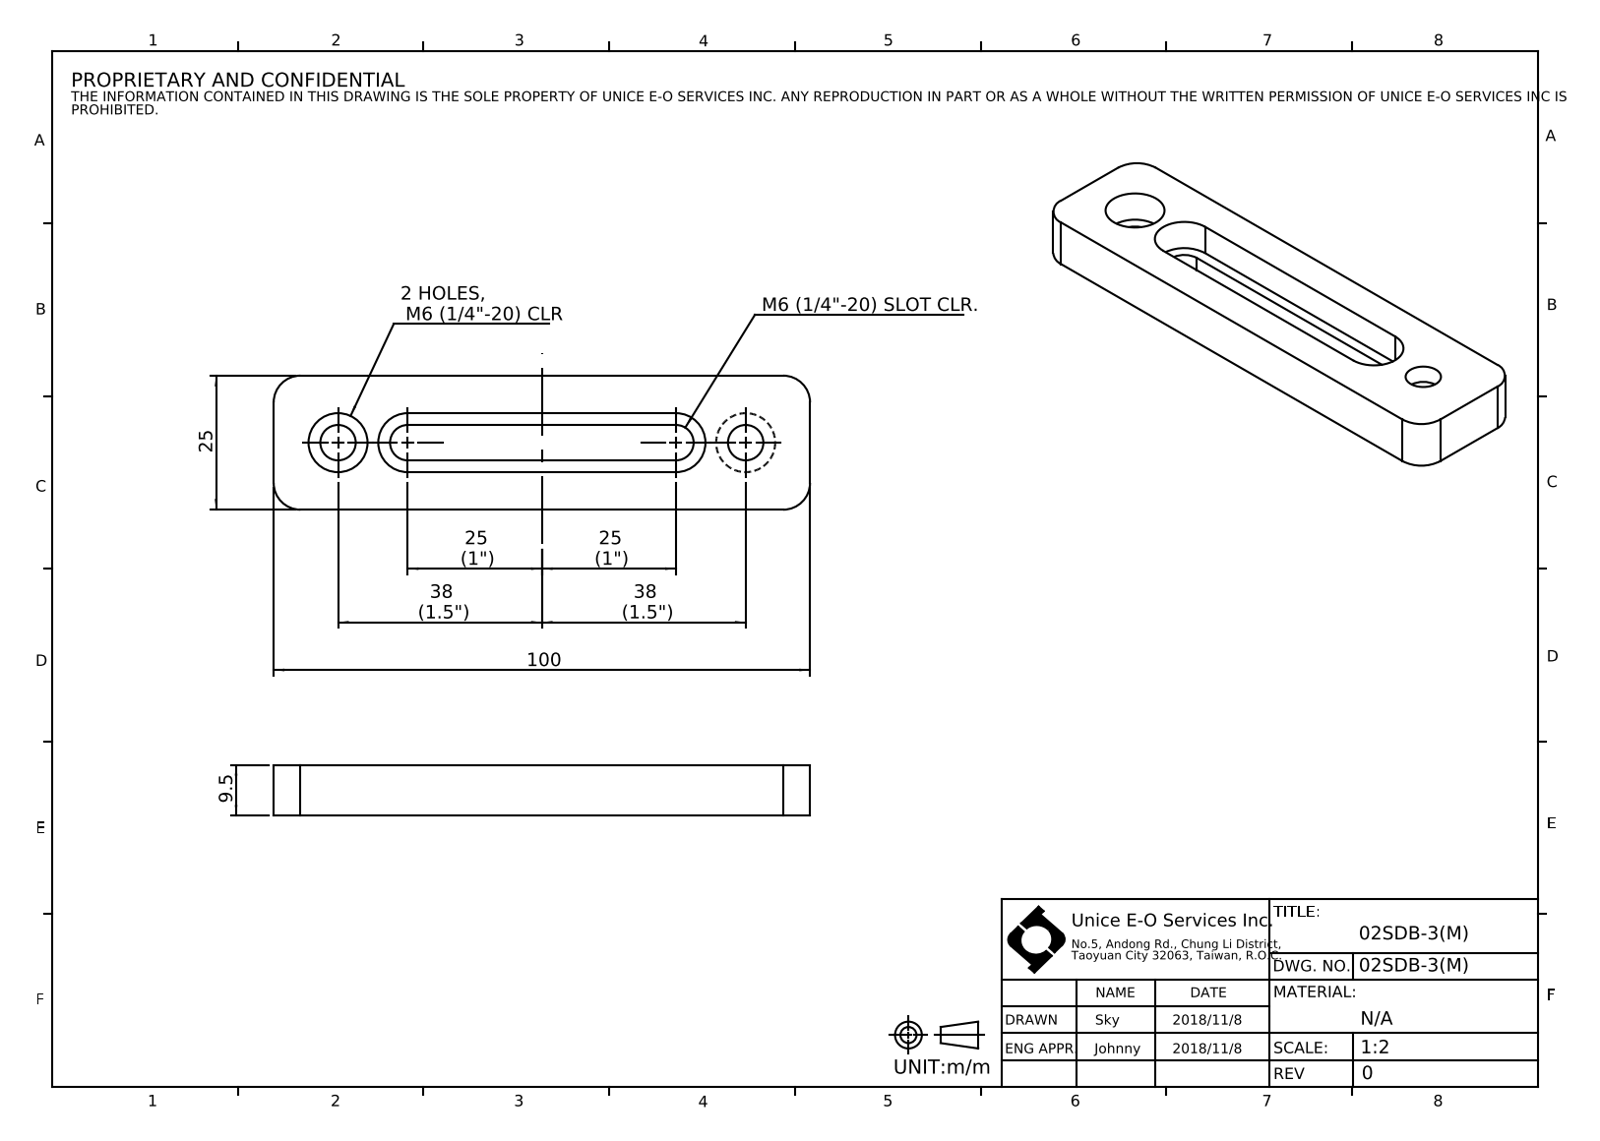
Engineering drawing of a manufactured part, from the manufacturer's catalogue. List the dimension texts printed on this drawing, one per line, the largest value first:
100
38 (1.5")
38 (1.5")
25 (1")
25 (1")
25
9.5
M6 (1/4"-20) SLOT CLR.
2 HOLES, M6 (1/4"-20) CLR
